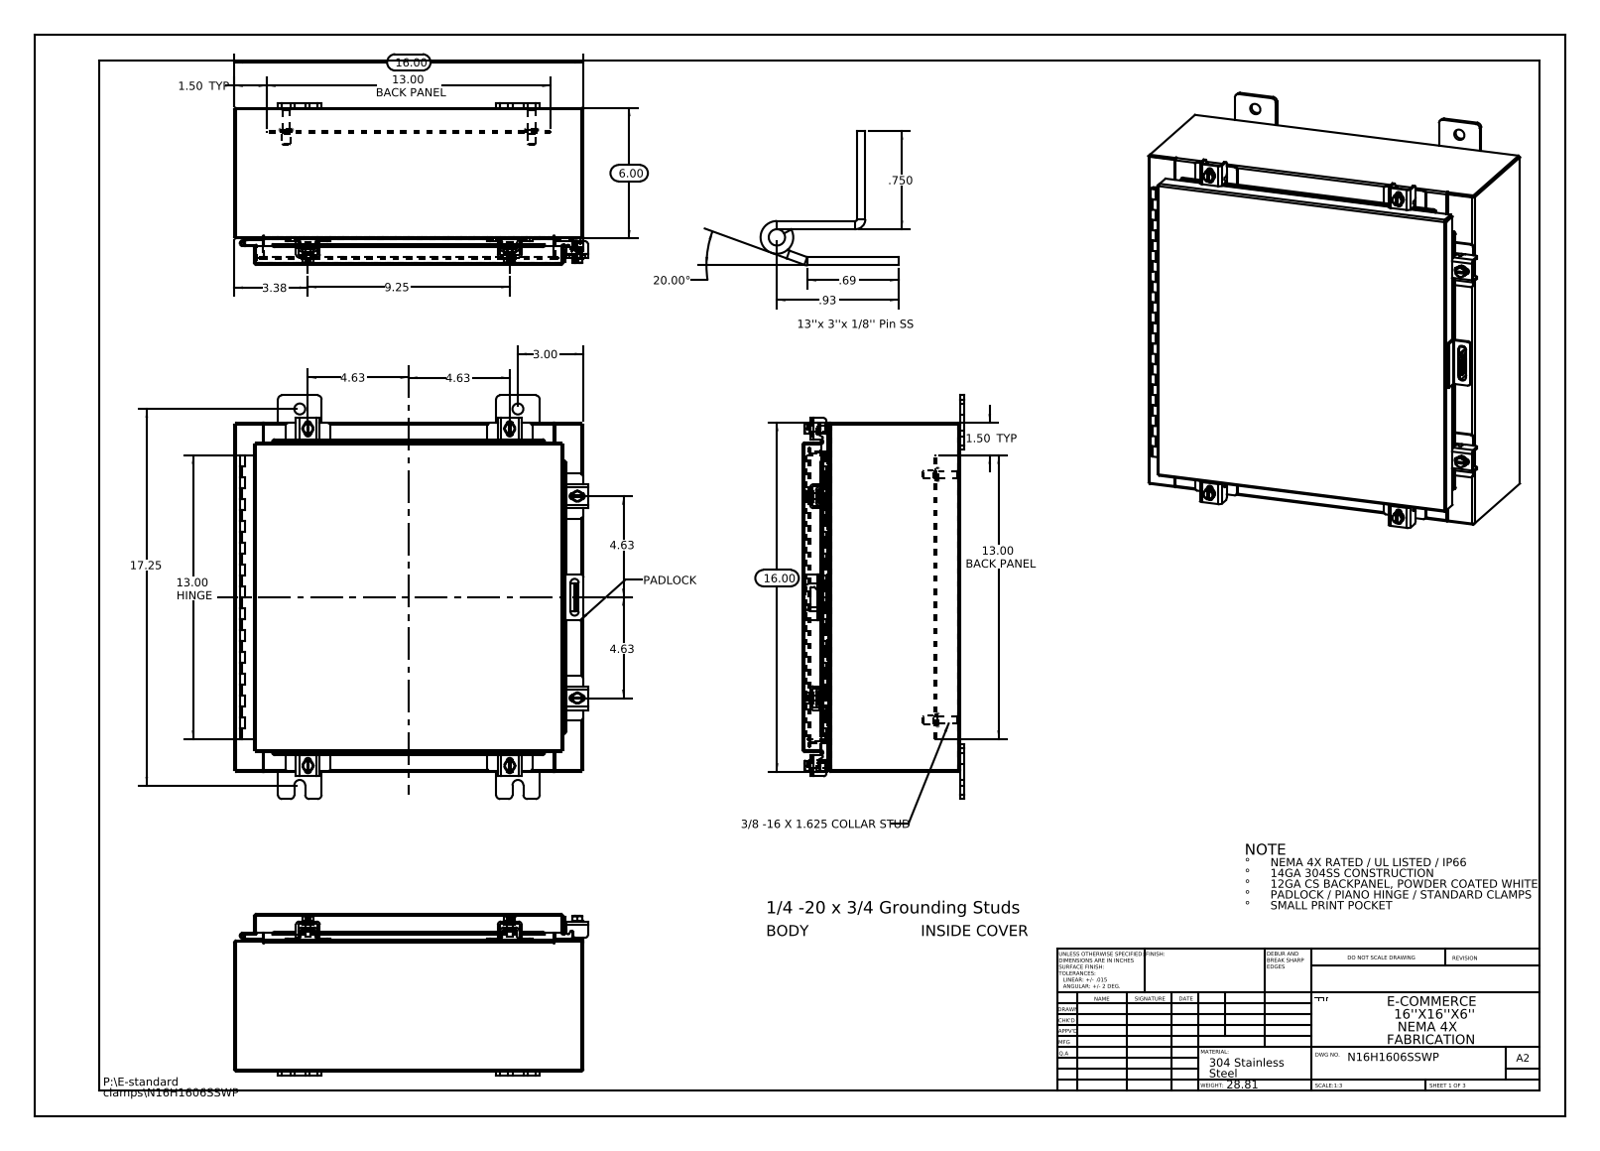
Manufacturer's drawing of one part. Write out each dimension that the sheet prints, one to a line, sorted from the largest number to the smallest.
20.00°
17.25
16.00
16.00
13.00 HINGE
13.00 BACK PANEL
13.00 BACK PANEL
9.25
6.00
4.63
4.63
4.63
4.63
3.38
3.00
1.50 TYP
1.50 TYP
.93
.750
.69
